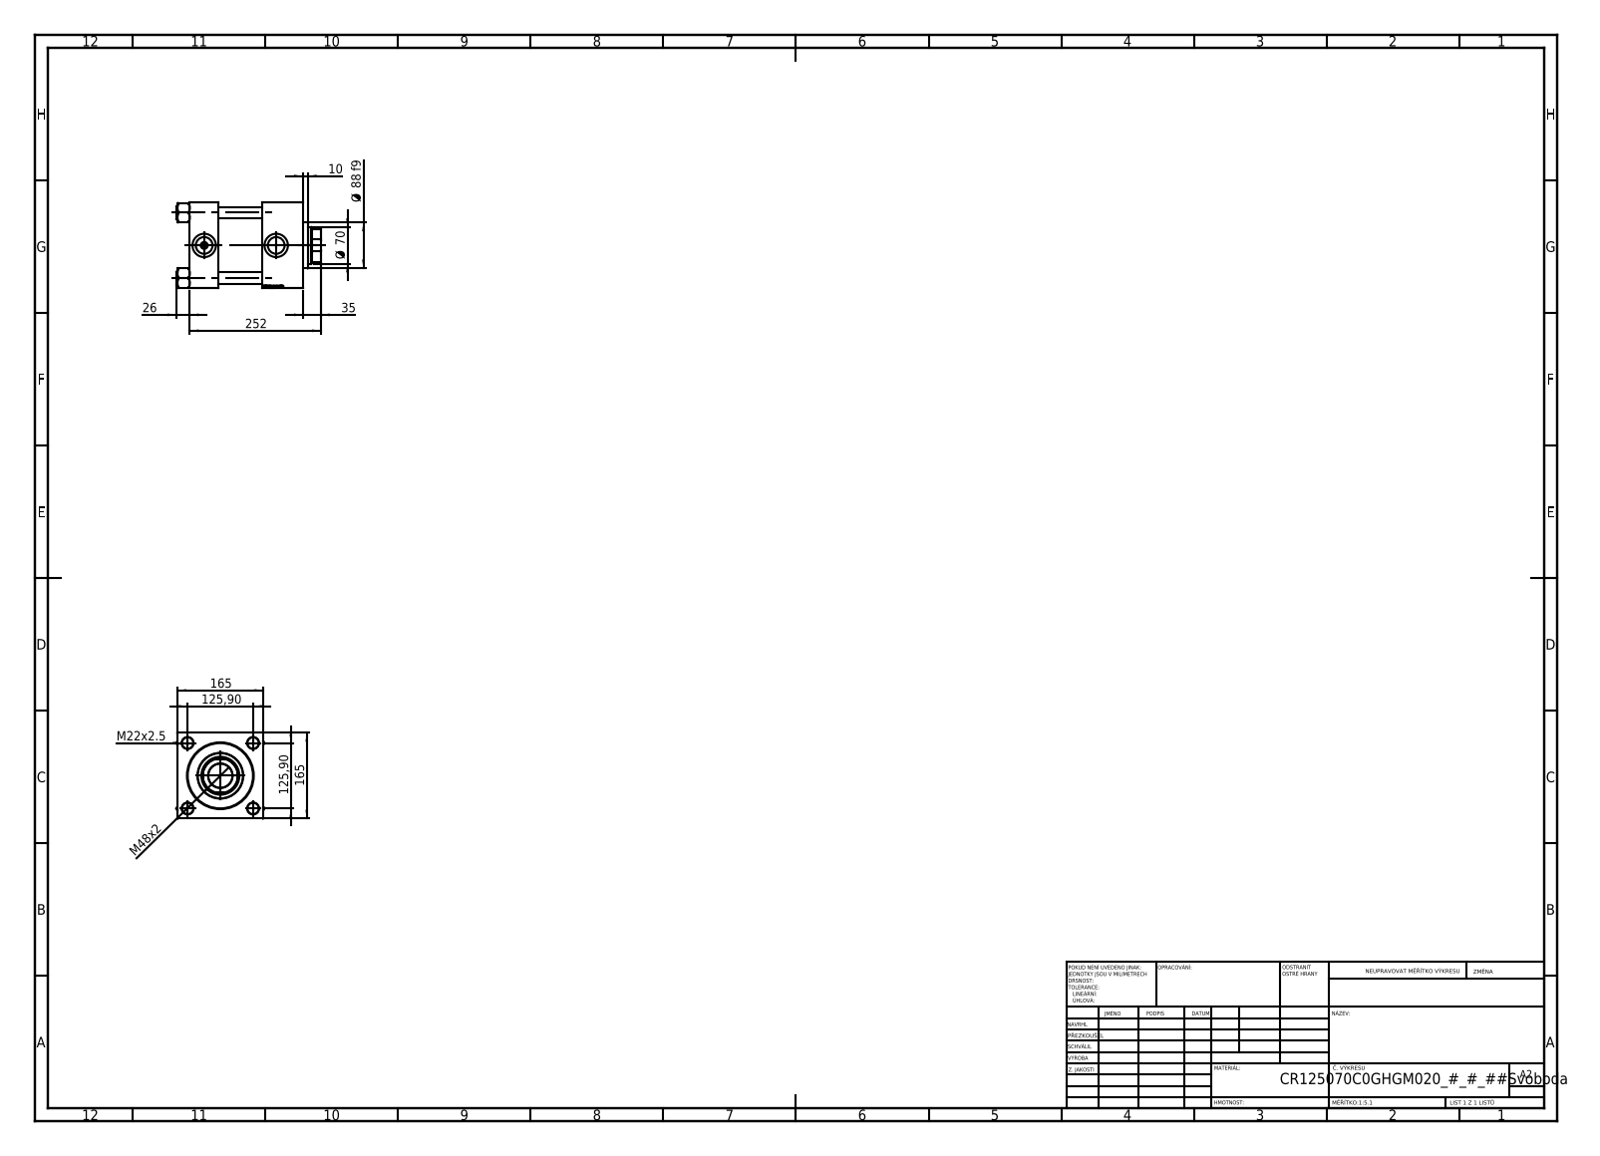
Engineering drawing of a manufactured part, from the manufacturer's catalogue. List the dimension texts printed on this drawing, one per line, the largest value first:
252
165
165
125,90
125,90
Ø 88 f9
Ø 70
M48x2
35
26
M22x2.5
10
